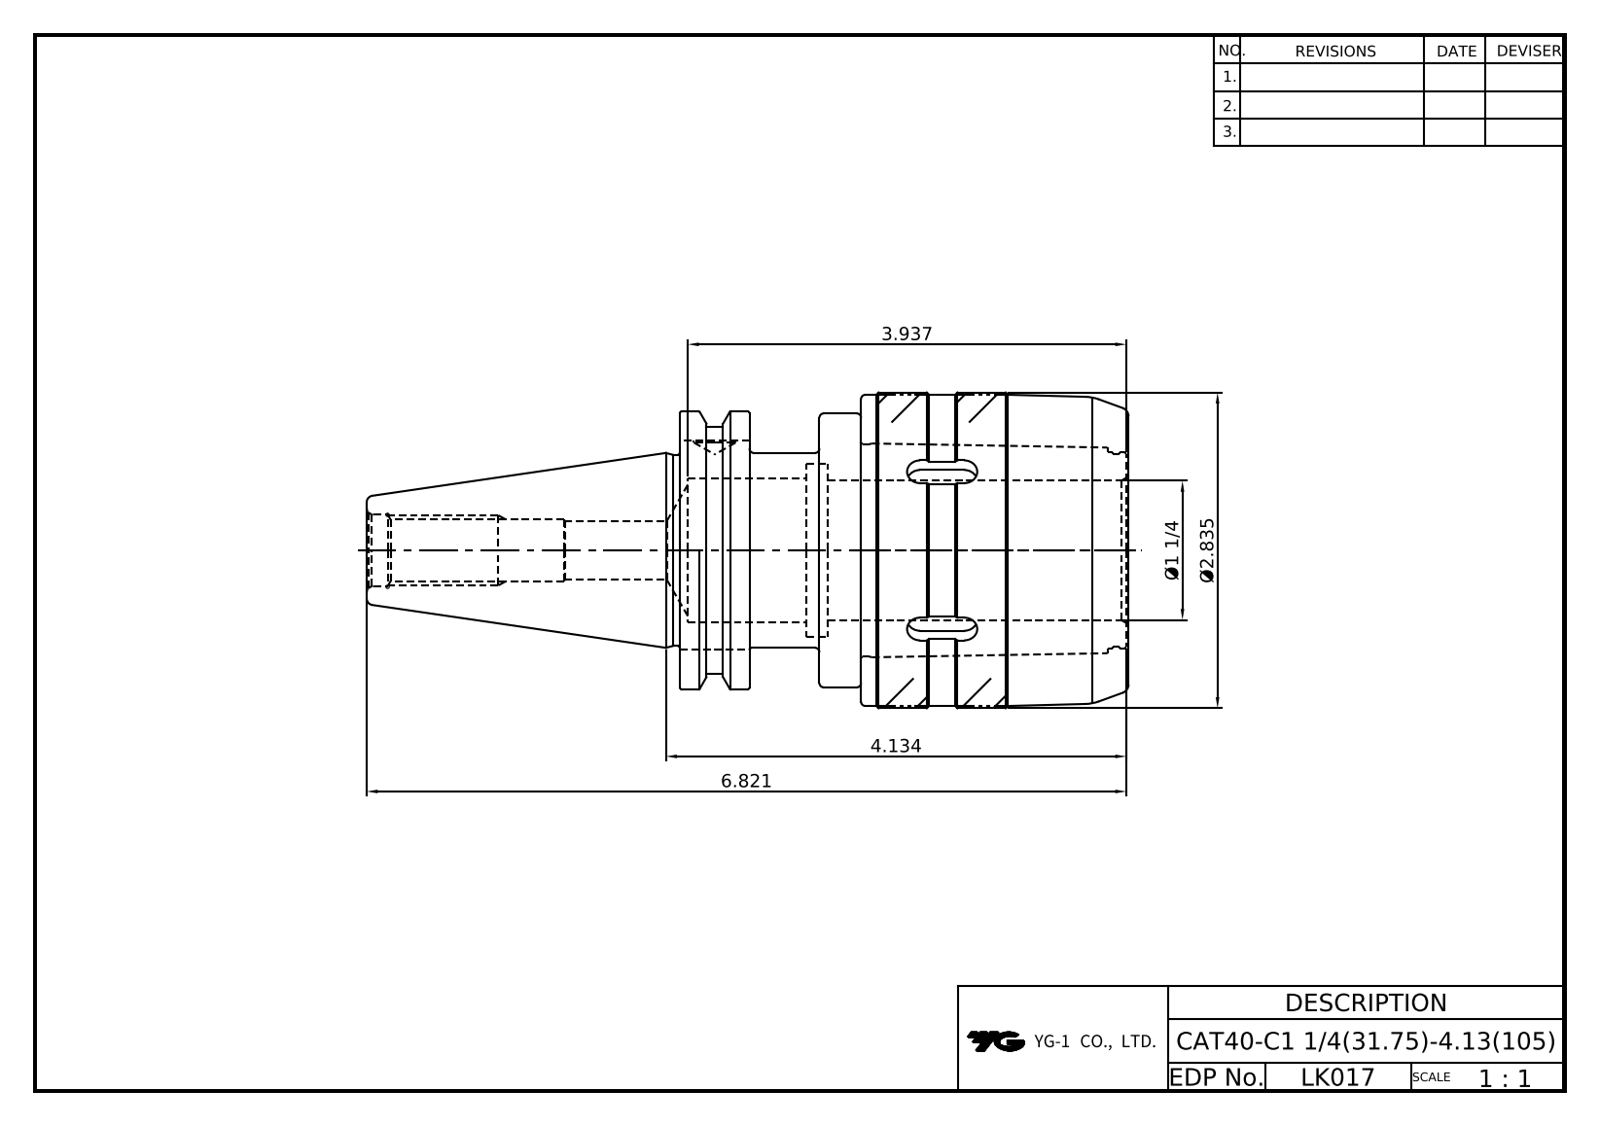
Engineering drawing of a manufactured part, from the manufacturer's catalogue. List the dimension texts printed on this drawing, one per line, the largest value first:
6.821
4.134
3.937
Ø2.835
Ø1 1/4
